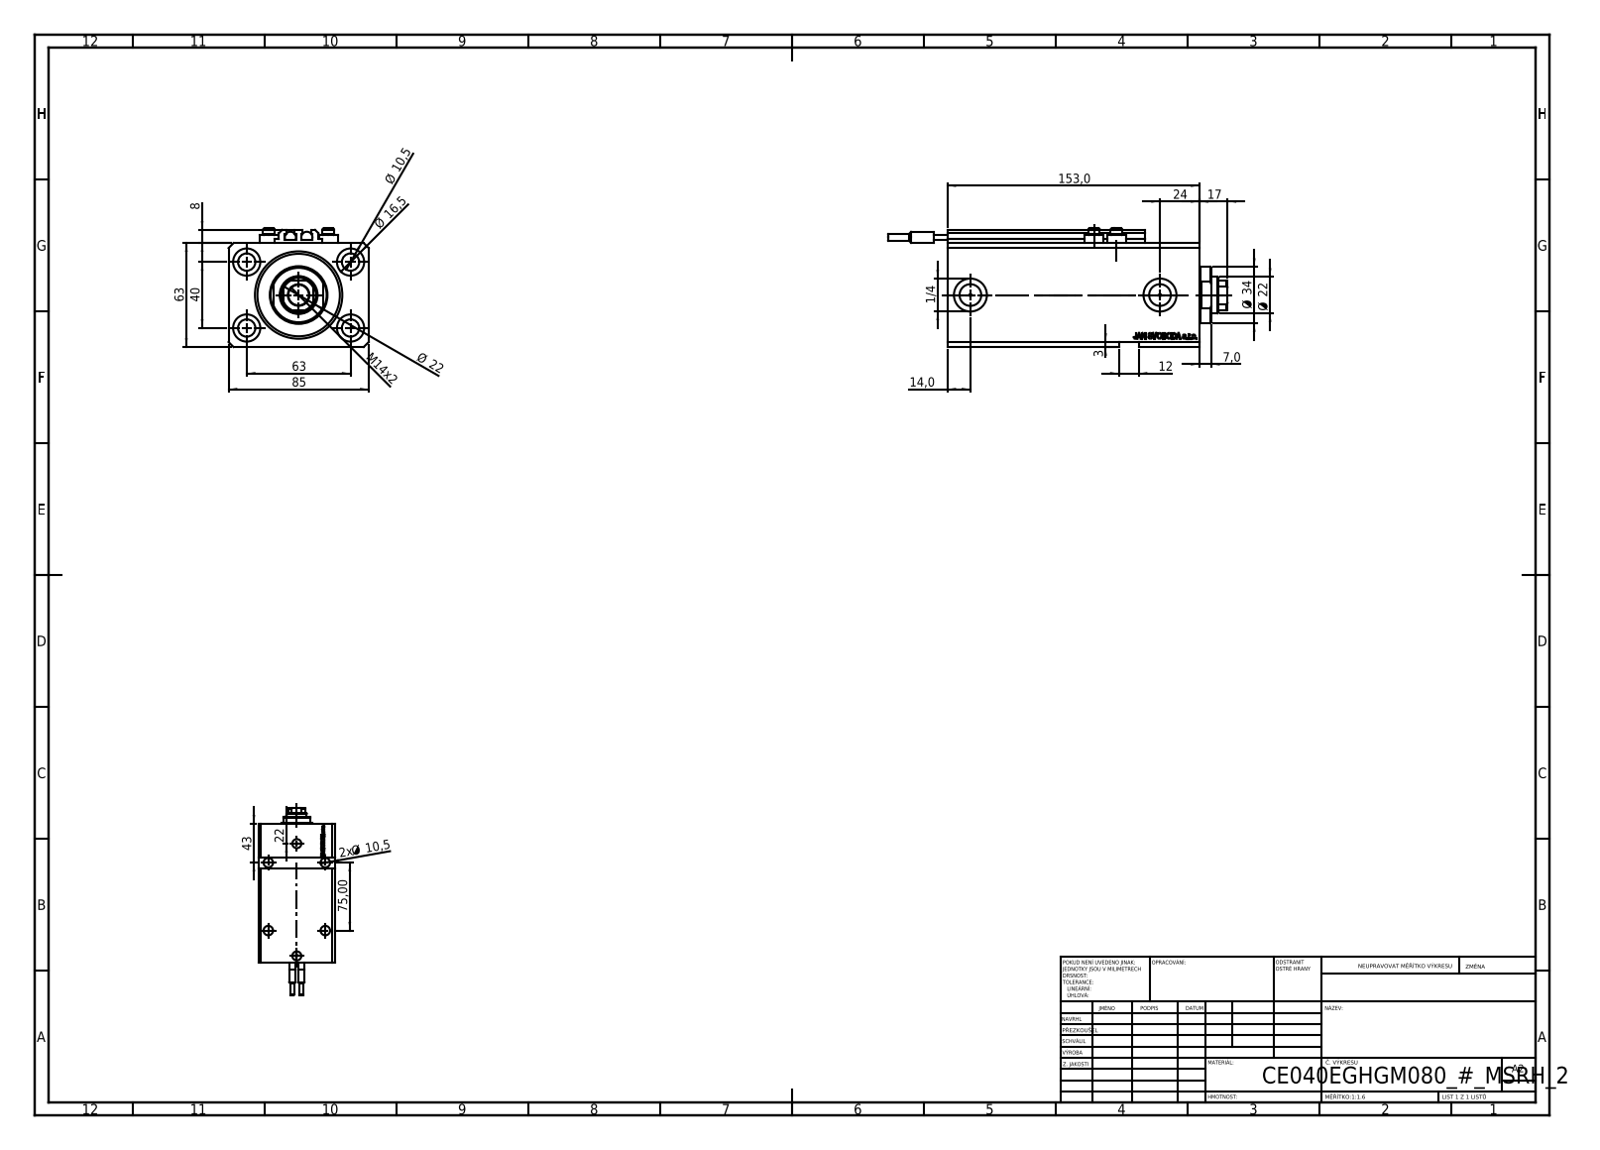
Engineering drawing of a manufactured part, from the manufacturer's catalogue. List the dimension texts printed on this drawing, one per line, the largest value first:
153,0
85
75,00
63
63
43
40
Ø 34
24
Ø 22
Ø 22
22
17
Ø 16,5
M14x2
14,0
12
Ø 10,5
2x Ø 10,5
8
7,0
3
1/4
